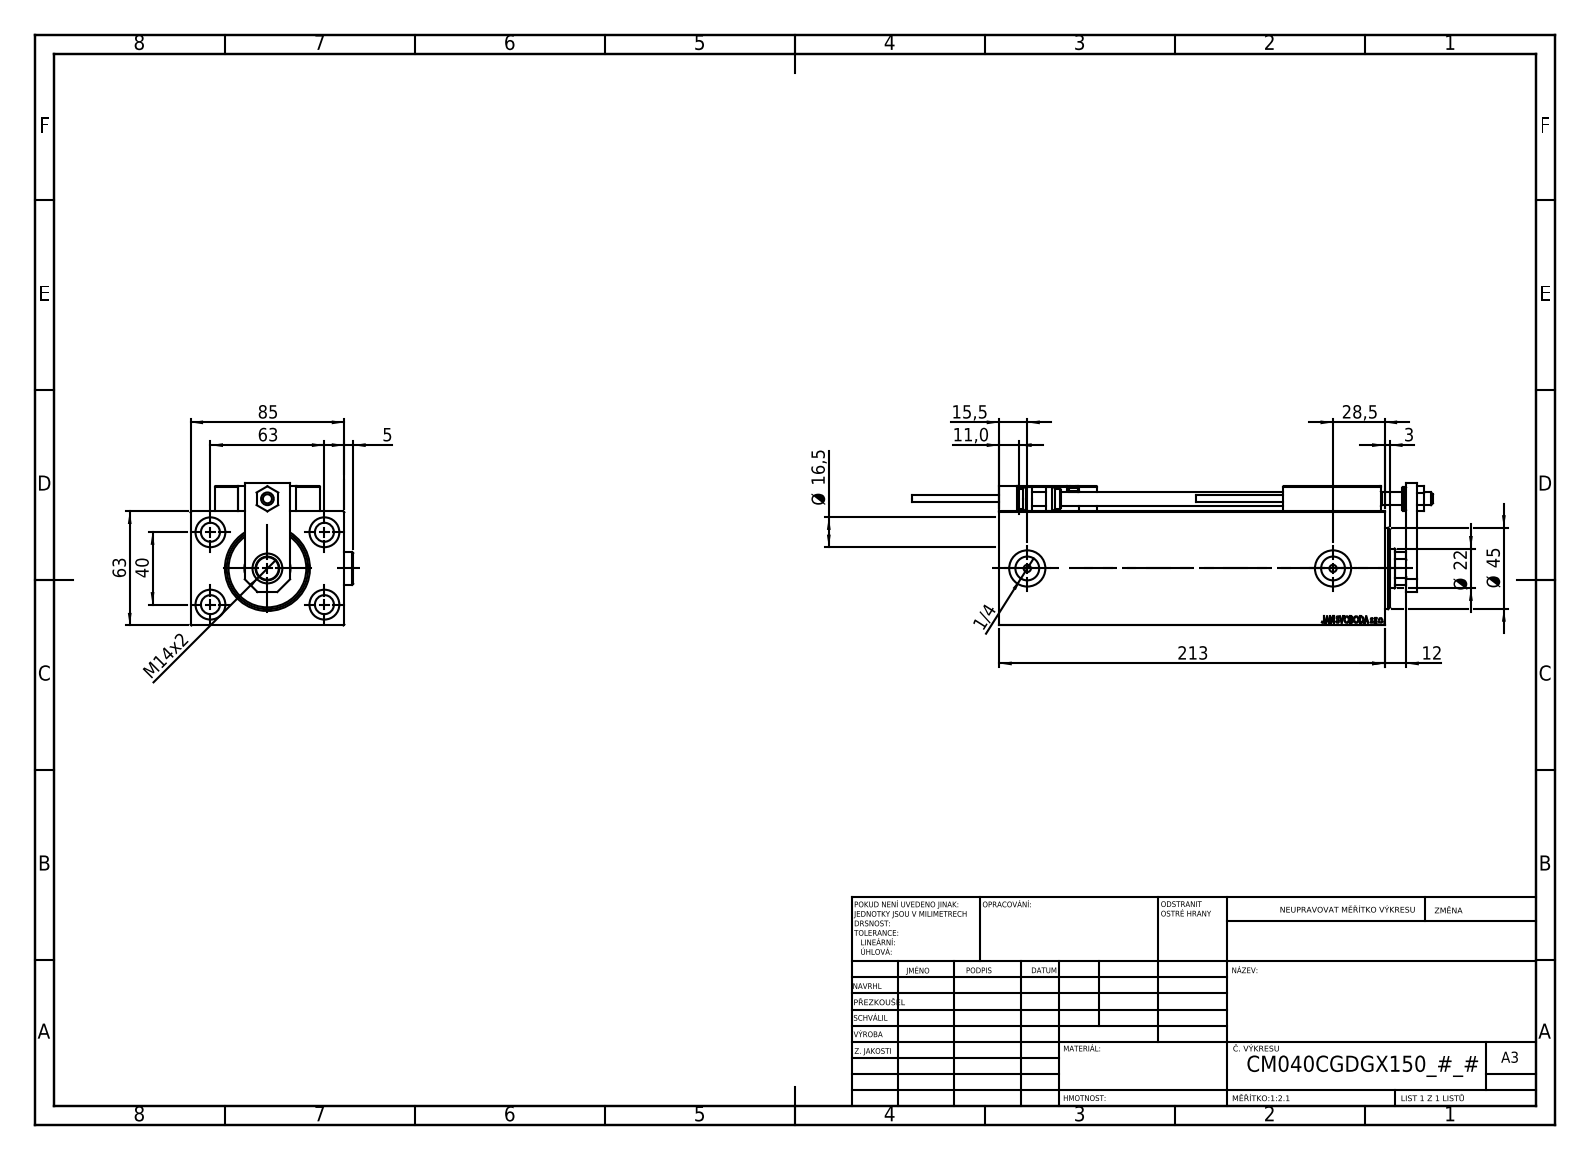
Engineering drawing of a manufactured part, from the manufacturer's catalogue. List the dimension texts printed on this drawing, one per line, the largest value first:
213
85
63
63
Ø 45
40
28,5
Ø 22
Ø 16,5
15,5
M14x2
12
11,0
5
3
1/4
